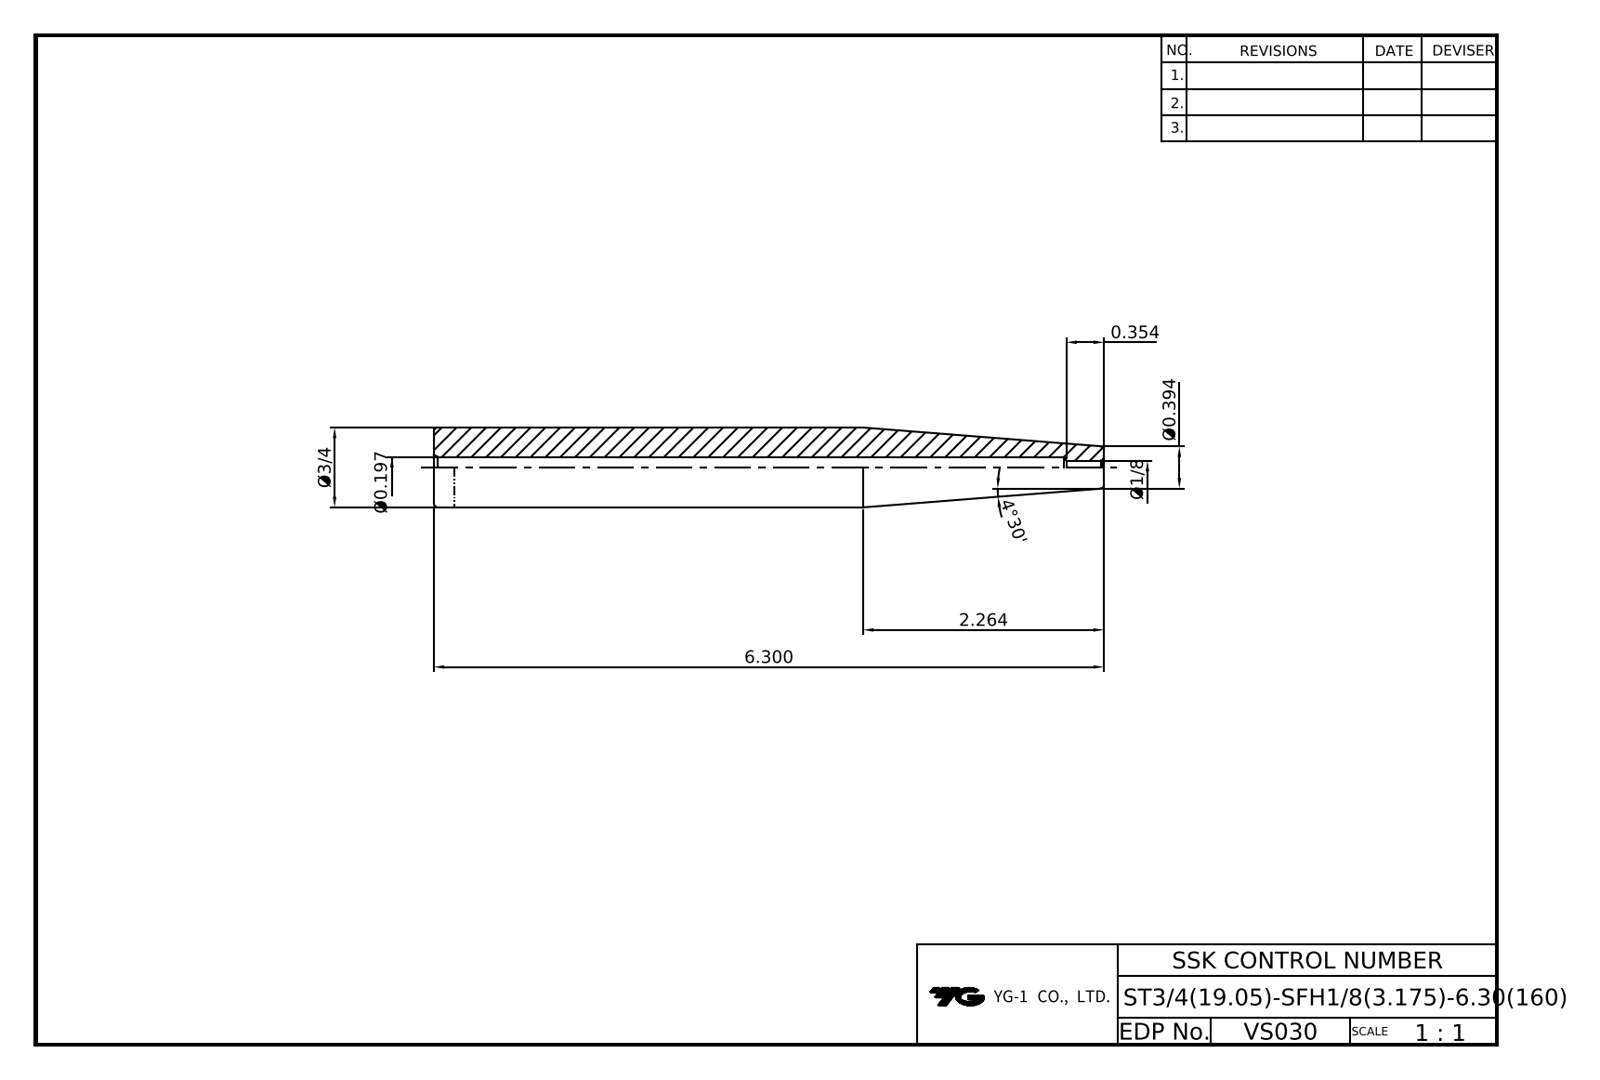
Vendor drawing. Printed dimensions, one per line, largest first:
6.300
4°30'
2.264
Ø3/4
Ø0.394
0.354
